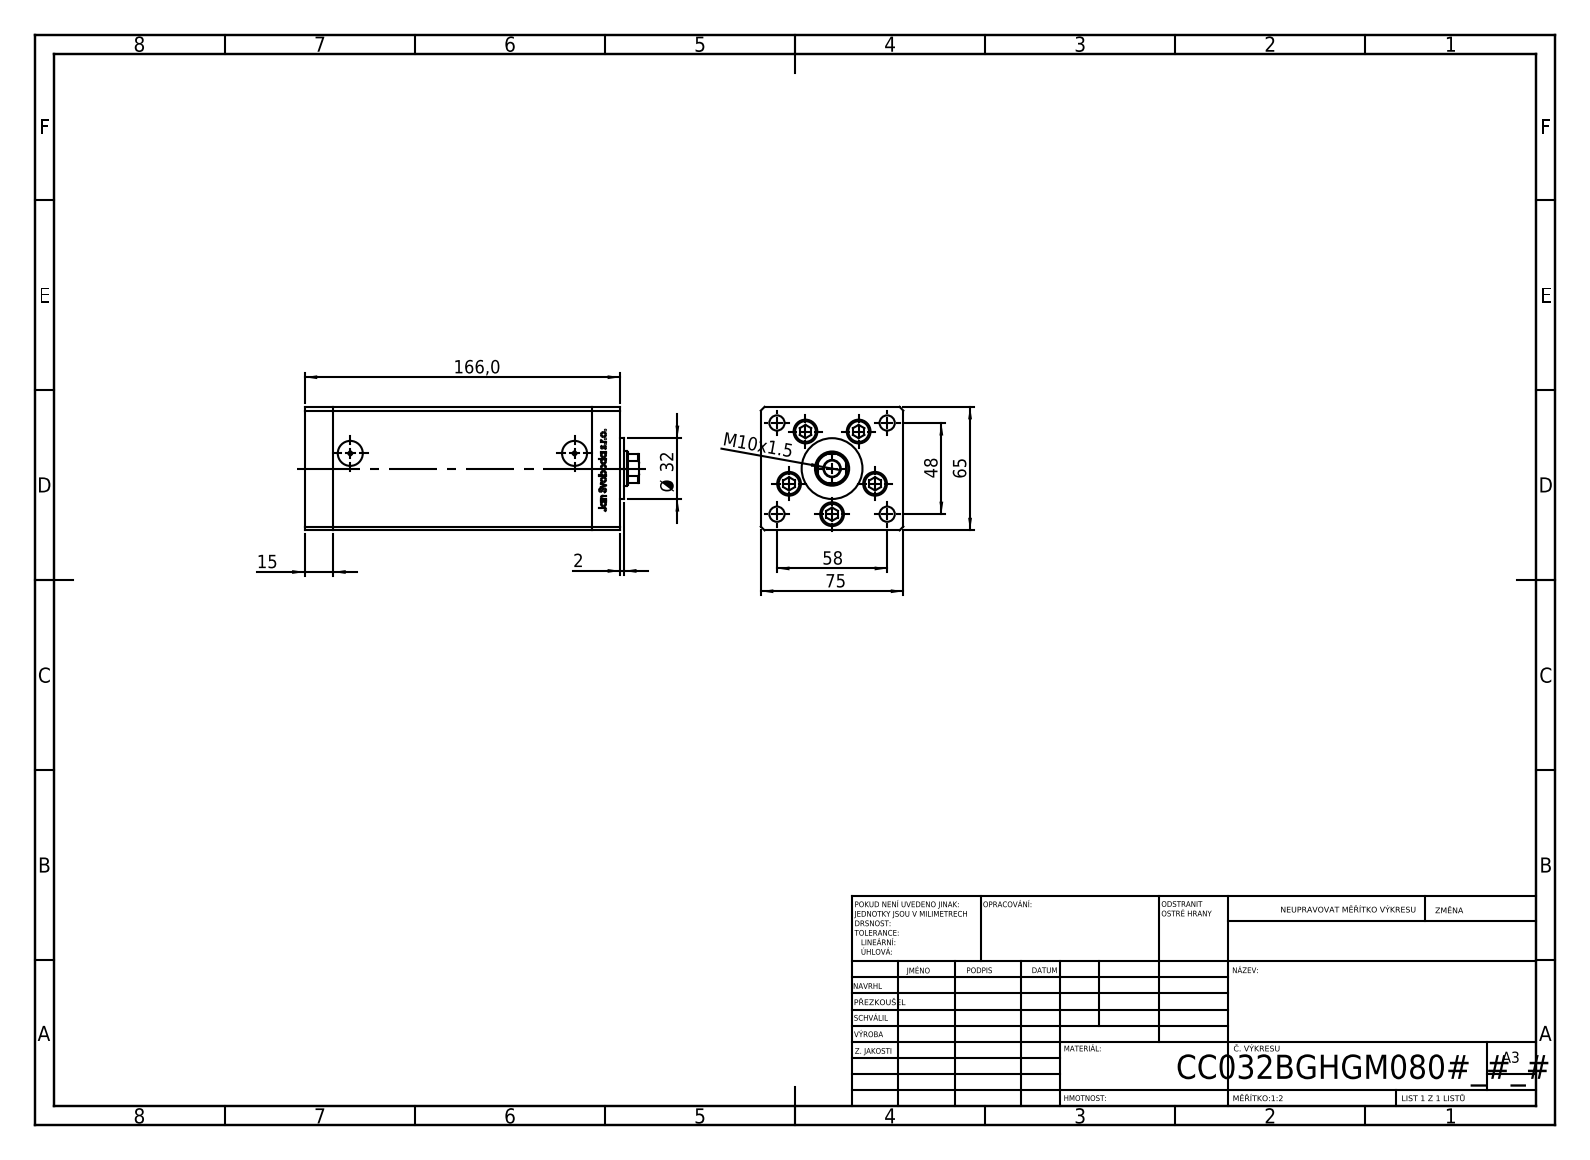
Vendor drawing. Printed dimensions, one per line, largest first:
166,0
75
65
58
48
Ø 32
15
M10x1.5
2
